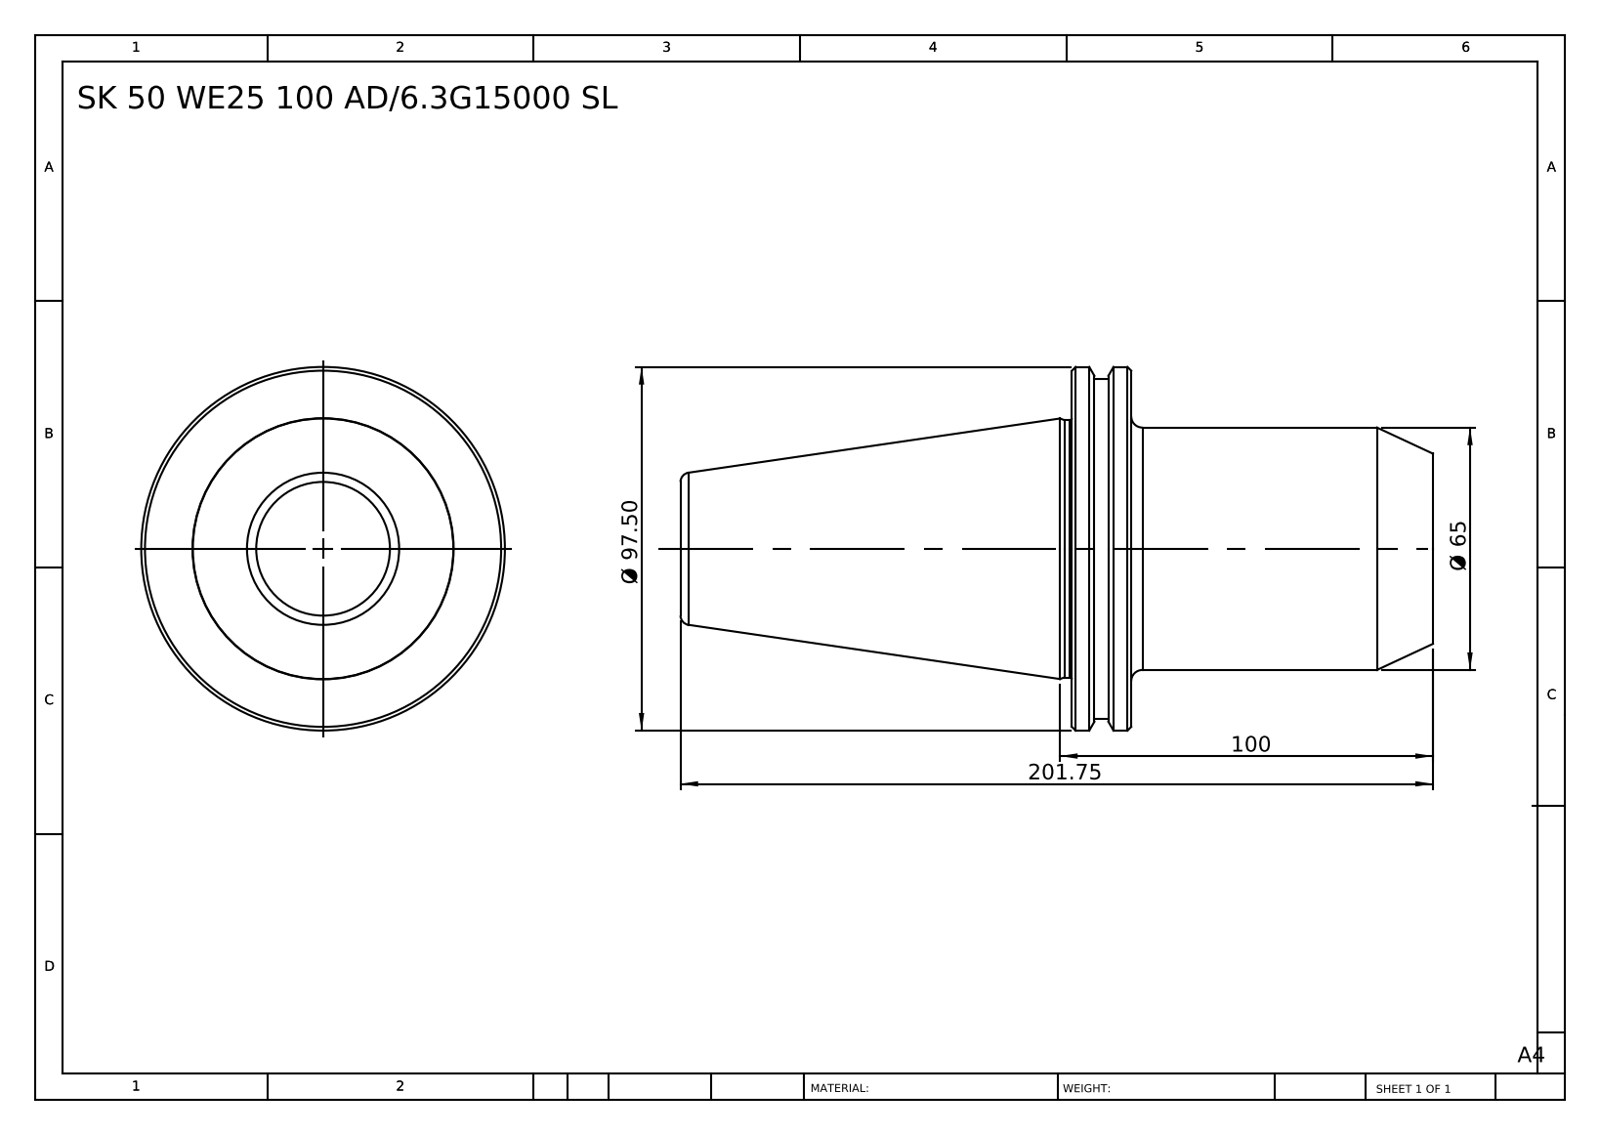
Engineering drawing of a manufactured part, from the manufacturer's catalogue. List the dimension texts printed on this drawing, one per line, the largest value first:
201.75
100
Ø 97.50
Ø 65
